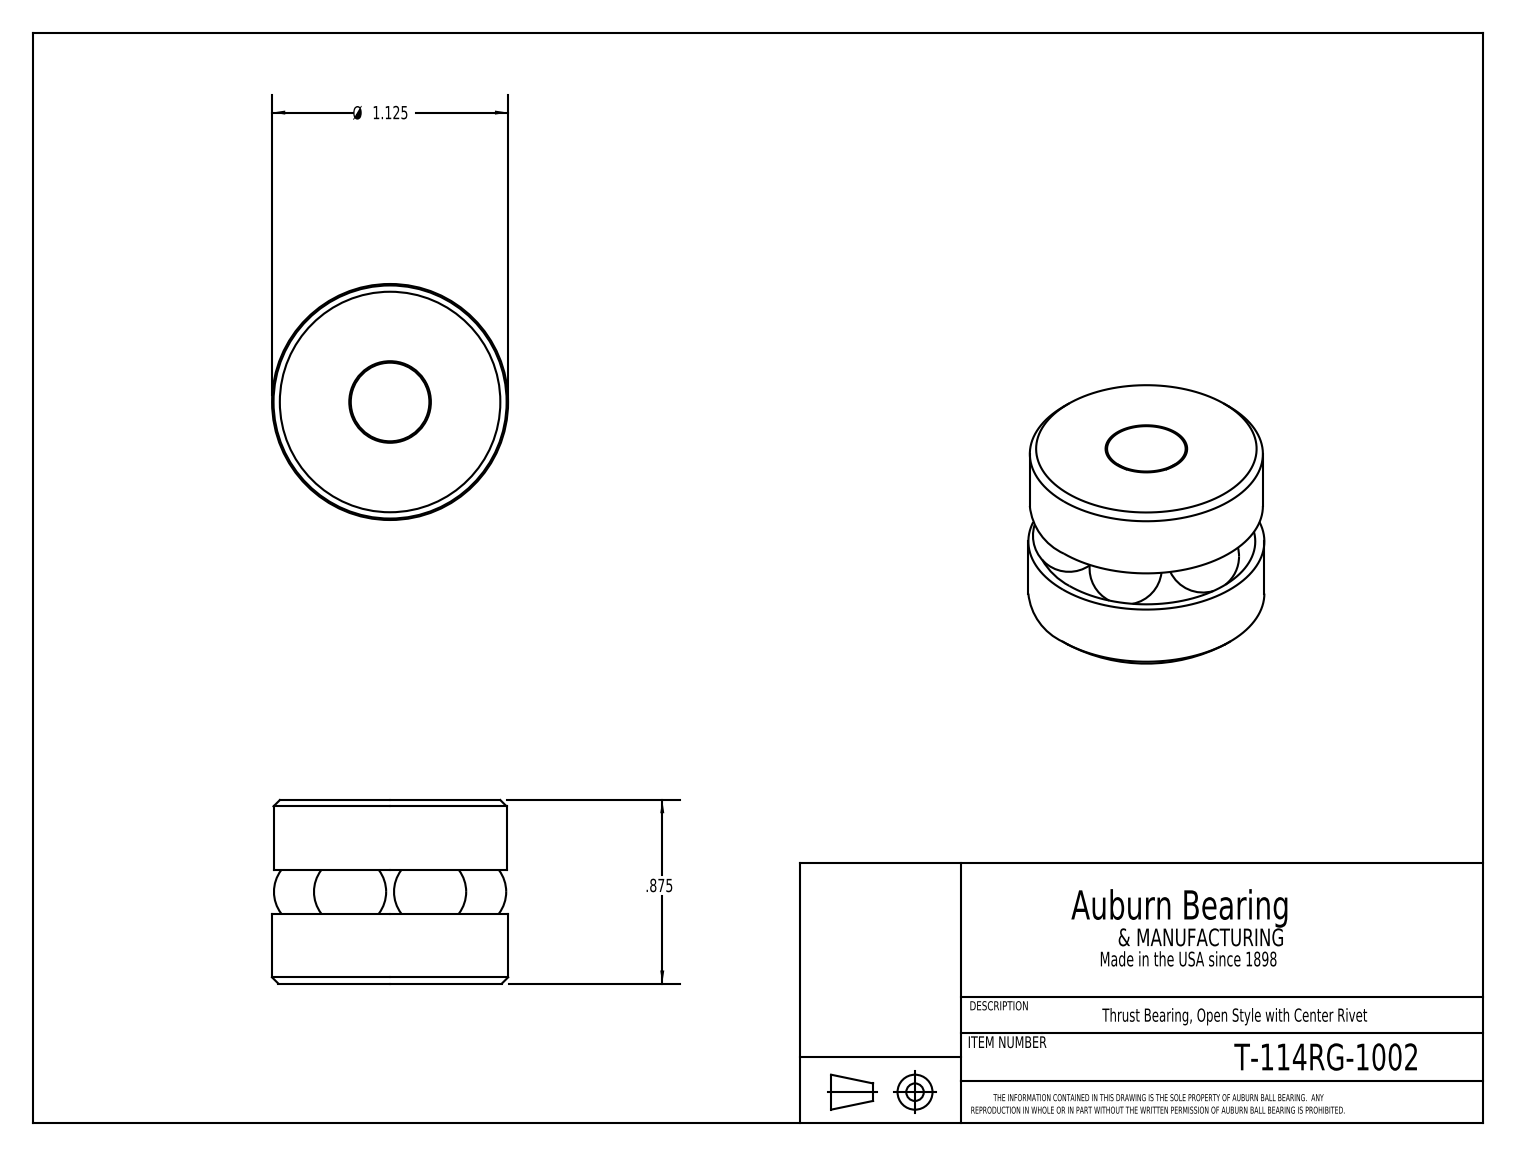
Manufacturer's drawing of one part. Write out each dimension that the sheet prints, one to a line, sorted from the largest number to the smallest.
Ø 1.125
.875
